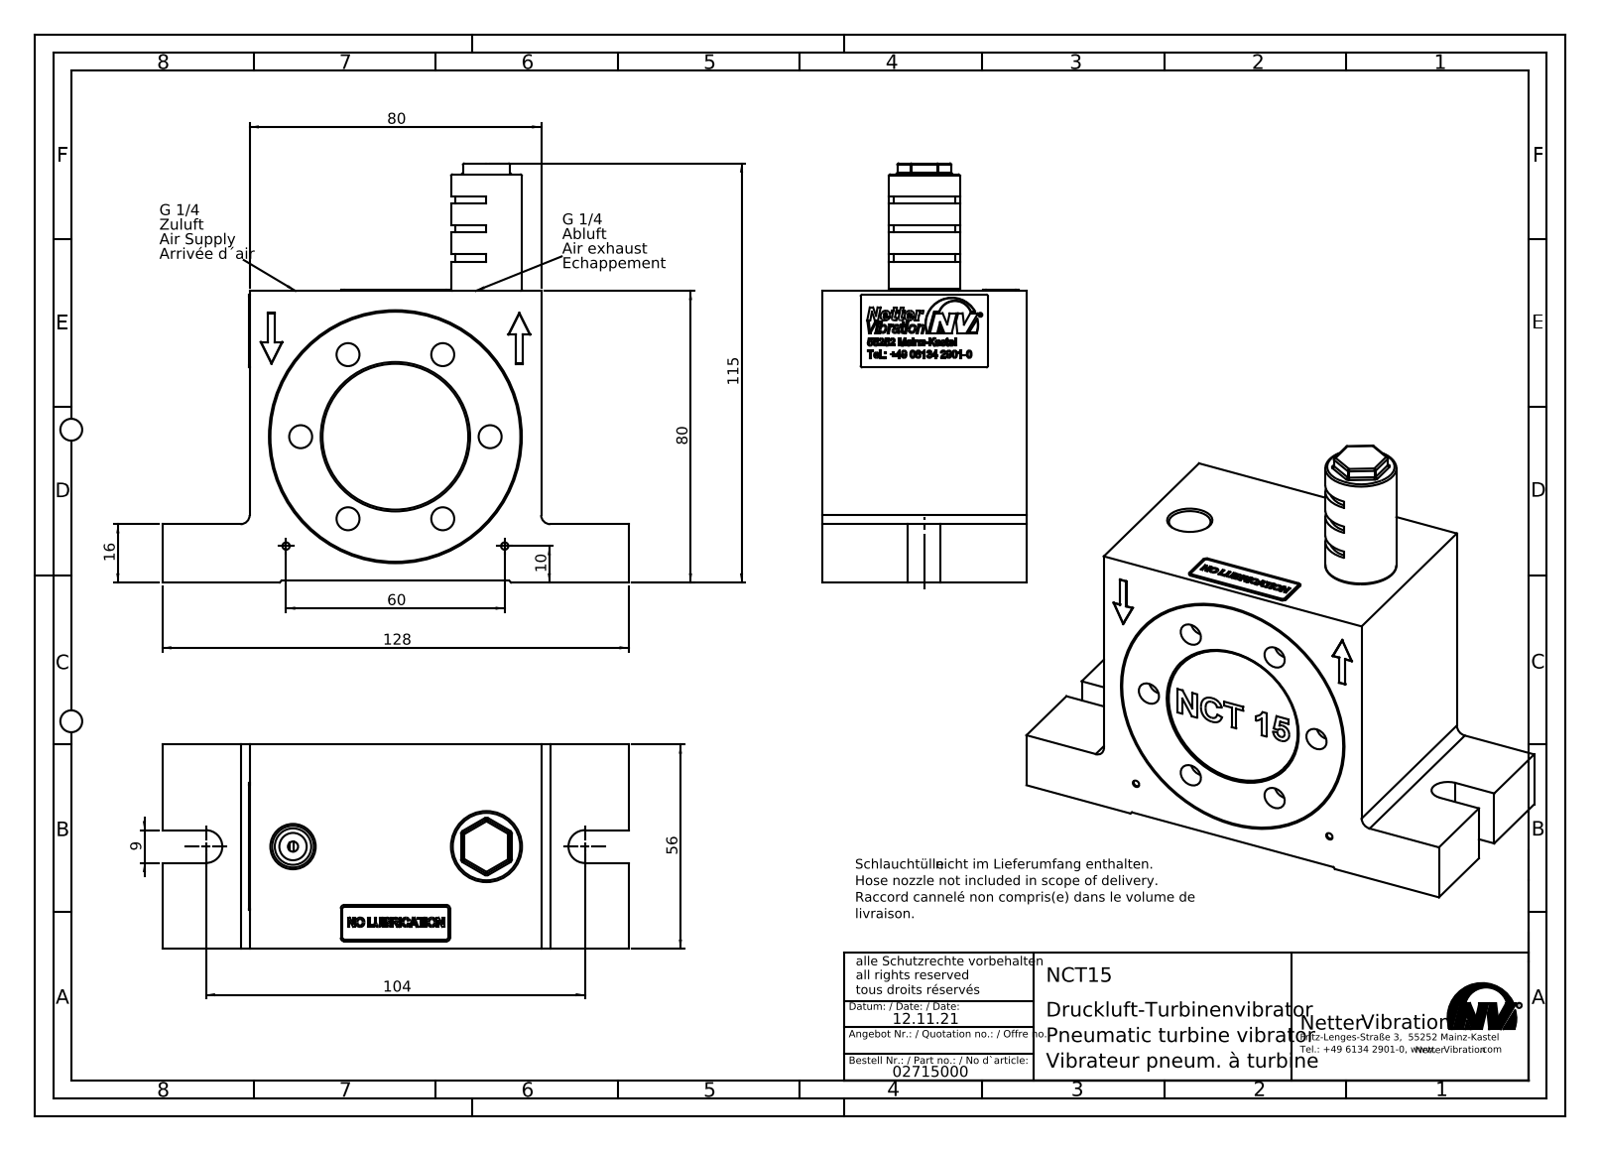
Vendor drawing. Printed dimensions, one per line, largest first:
128
115
104
80
80
60
56
16
10
9
